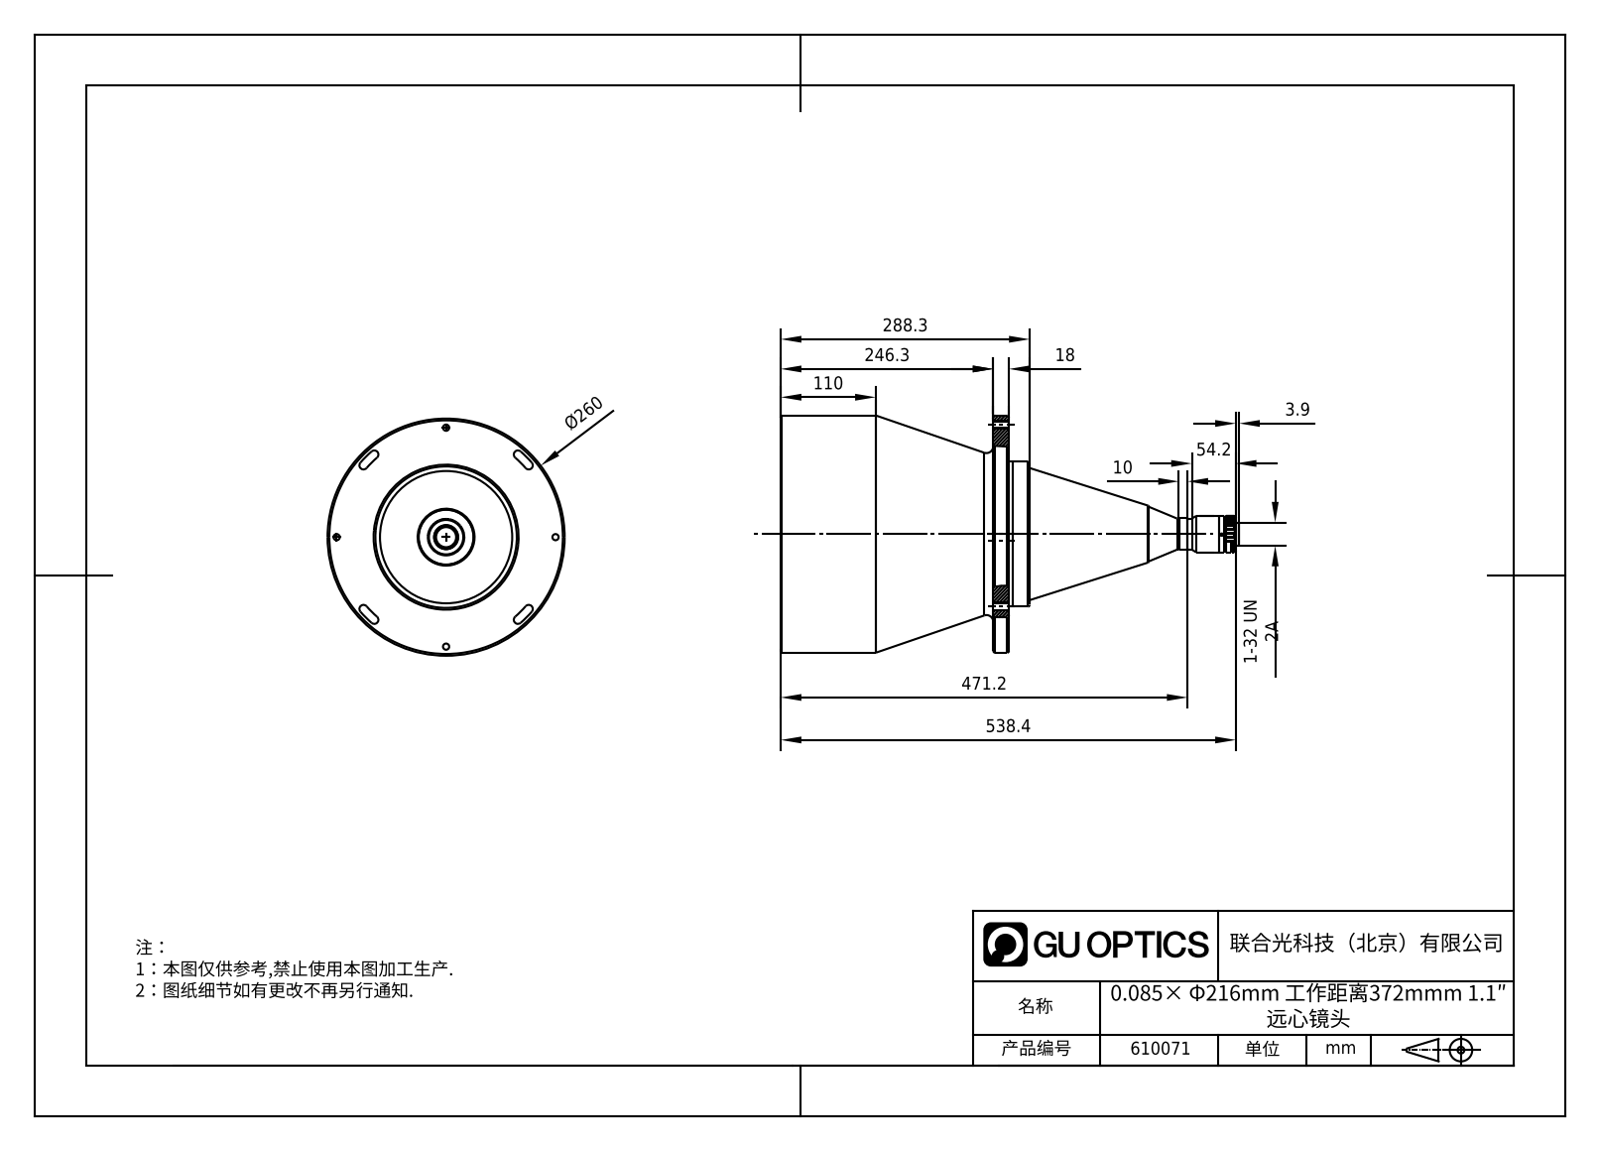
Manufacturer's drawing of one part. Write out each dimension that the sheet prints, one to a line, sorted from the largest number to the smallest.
538.4
471.2
288.3
Ø260
246.3
110
54.2
18
10
3.9
1-32 UN 2A
